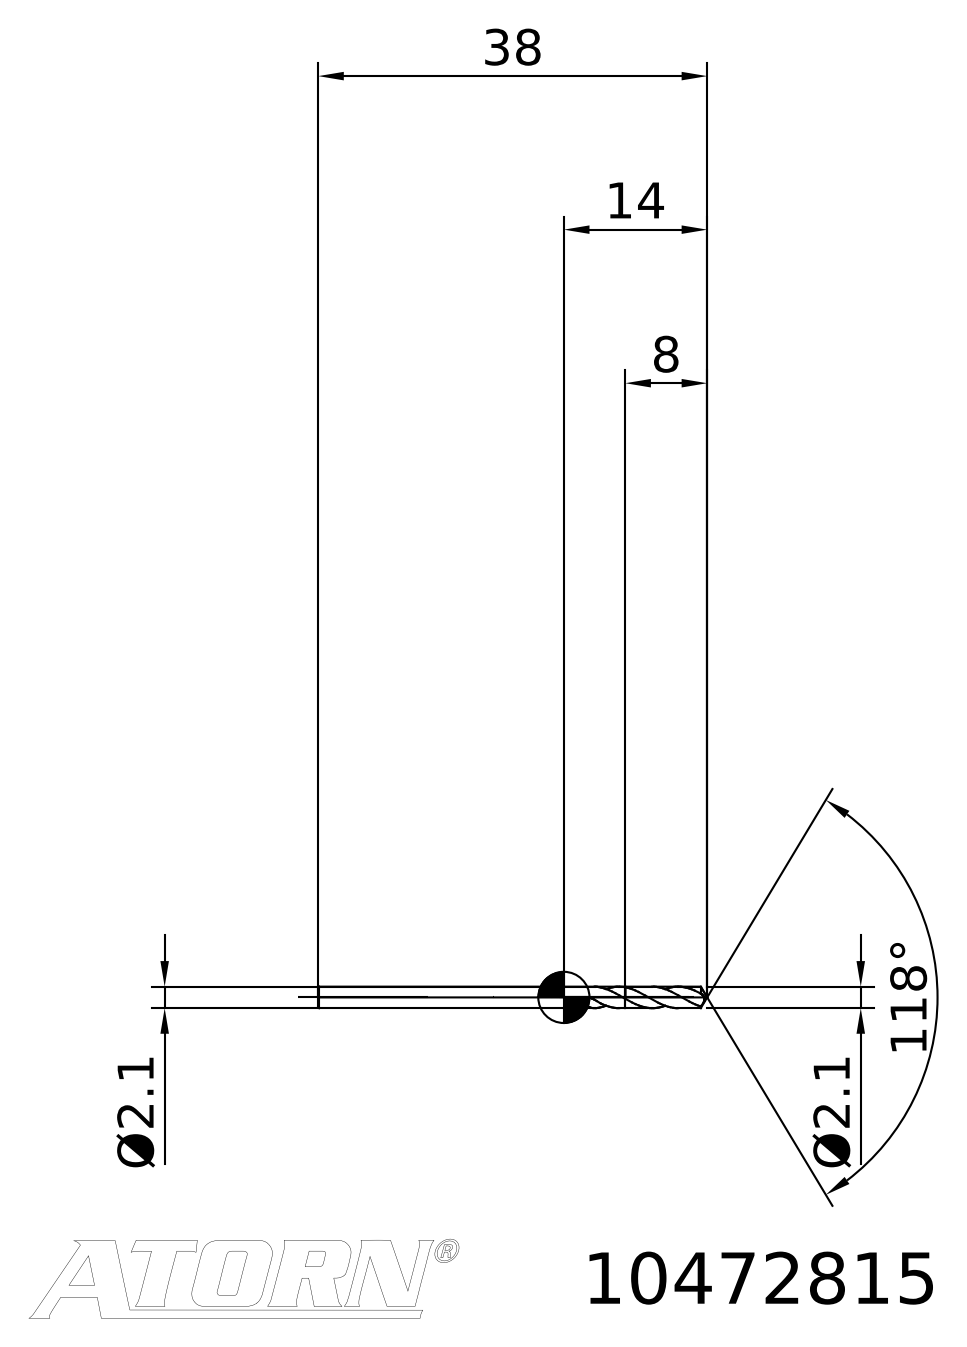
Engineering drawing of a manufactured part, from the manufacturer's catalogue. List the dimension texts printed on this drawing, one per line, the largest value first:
118°
38
14
8
Ø2.1
Ø2.1
